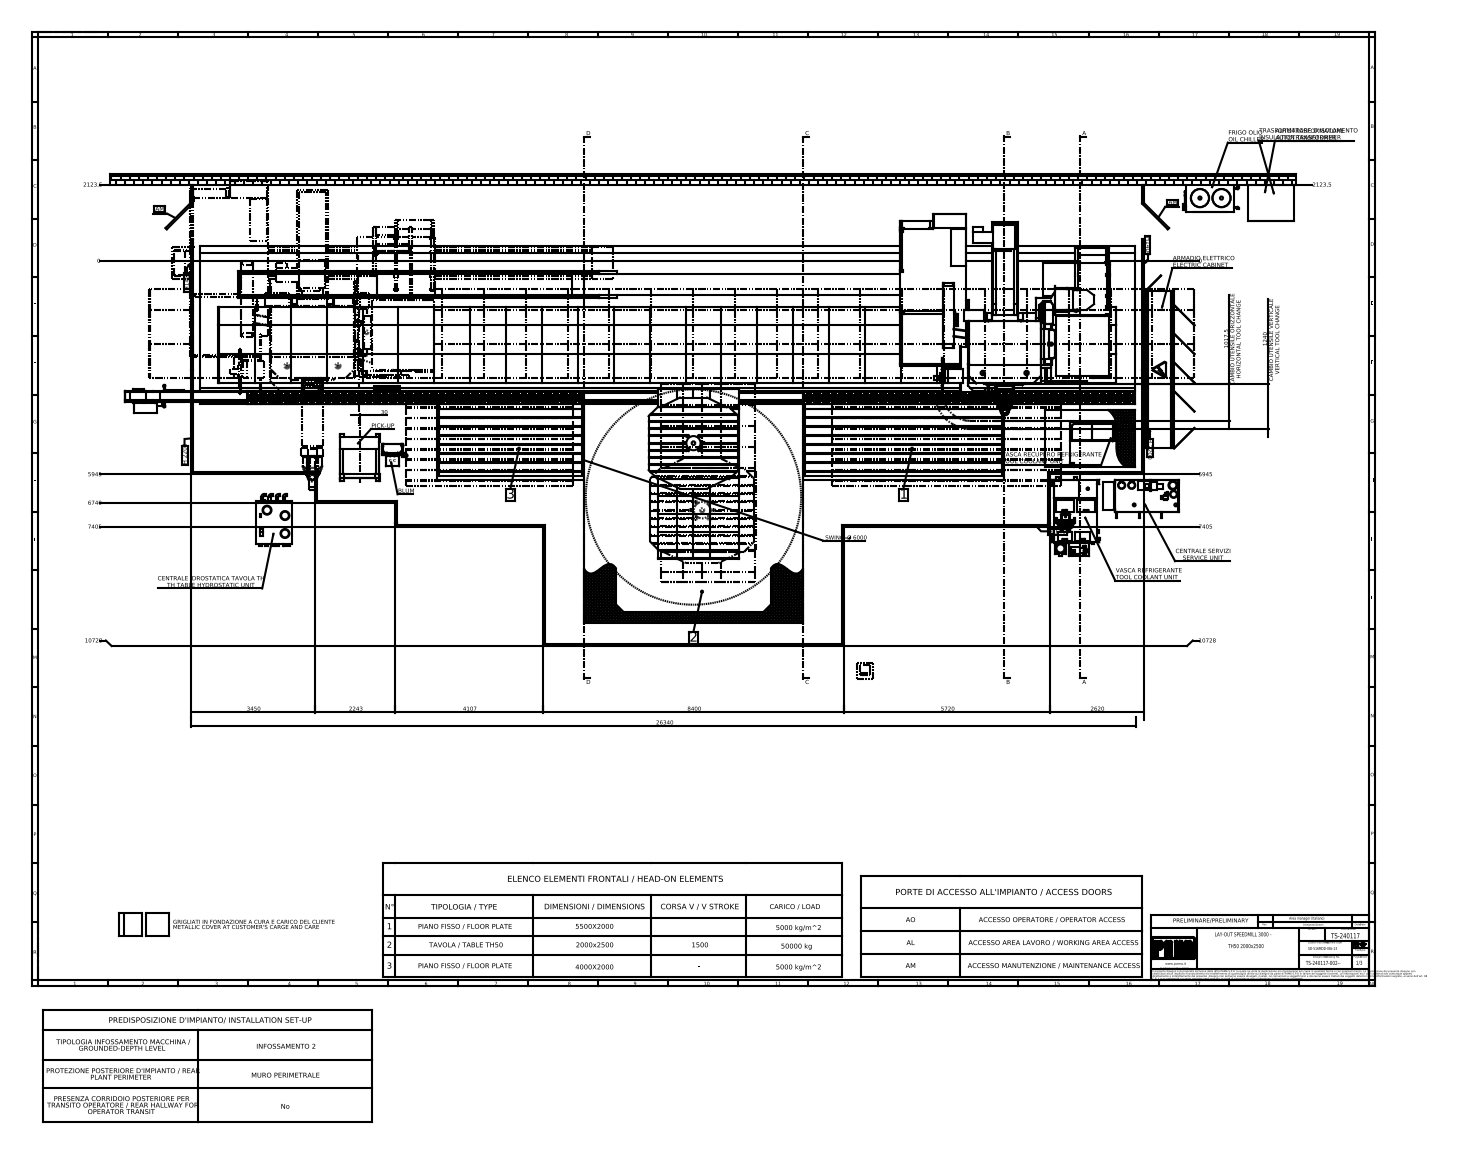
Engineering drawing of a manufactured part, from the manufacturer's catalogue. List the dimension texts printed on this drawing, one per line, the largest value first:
26340
10728
10728
8400
7405
7405
6740
SWING= Ø 6000
5945
5945
5720
4107
3450
2620
2243
2123,5
2123,5
1240 CAMBIO UTENSILE VERTICALE VERTICAL TOOL CHANGE
1017,5 CAMBIO UTENSILE ORIZZONTALE HORIZONTAL TOOL CHANGE
30
0
0
